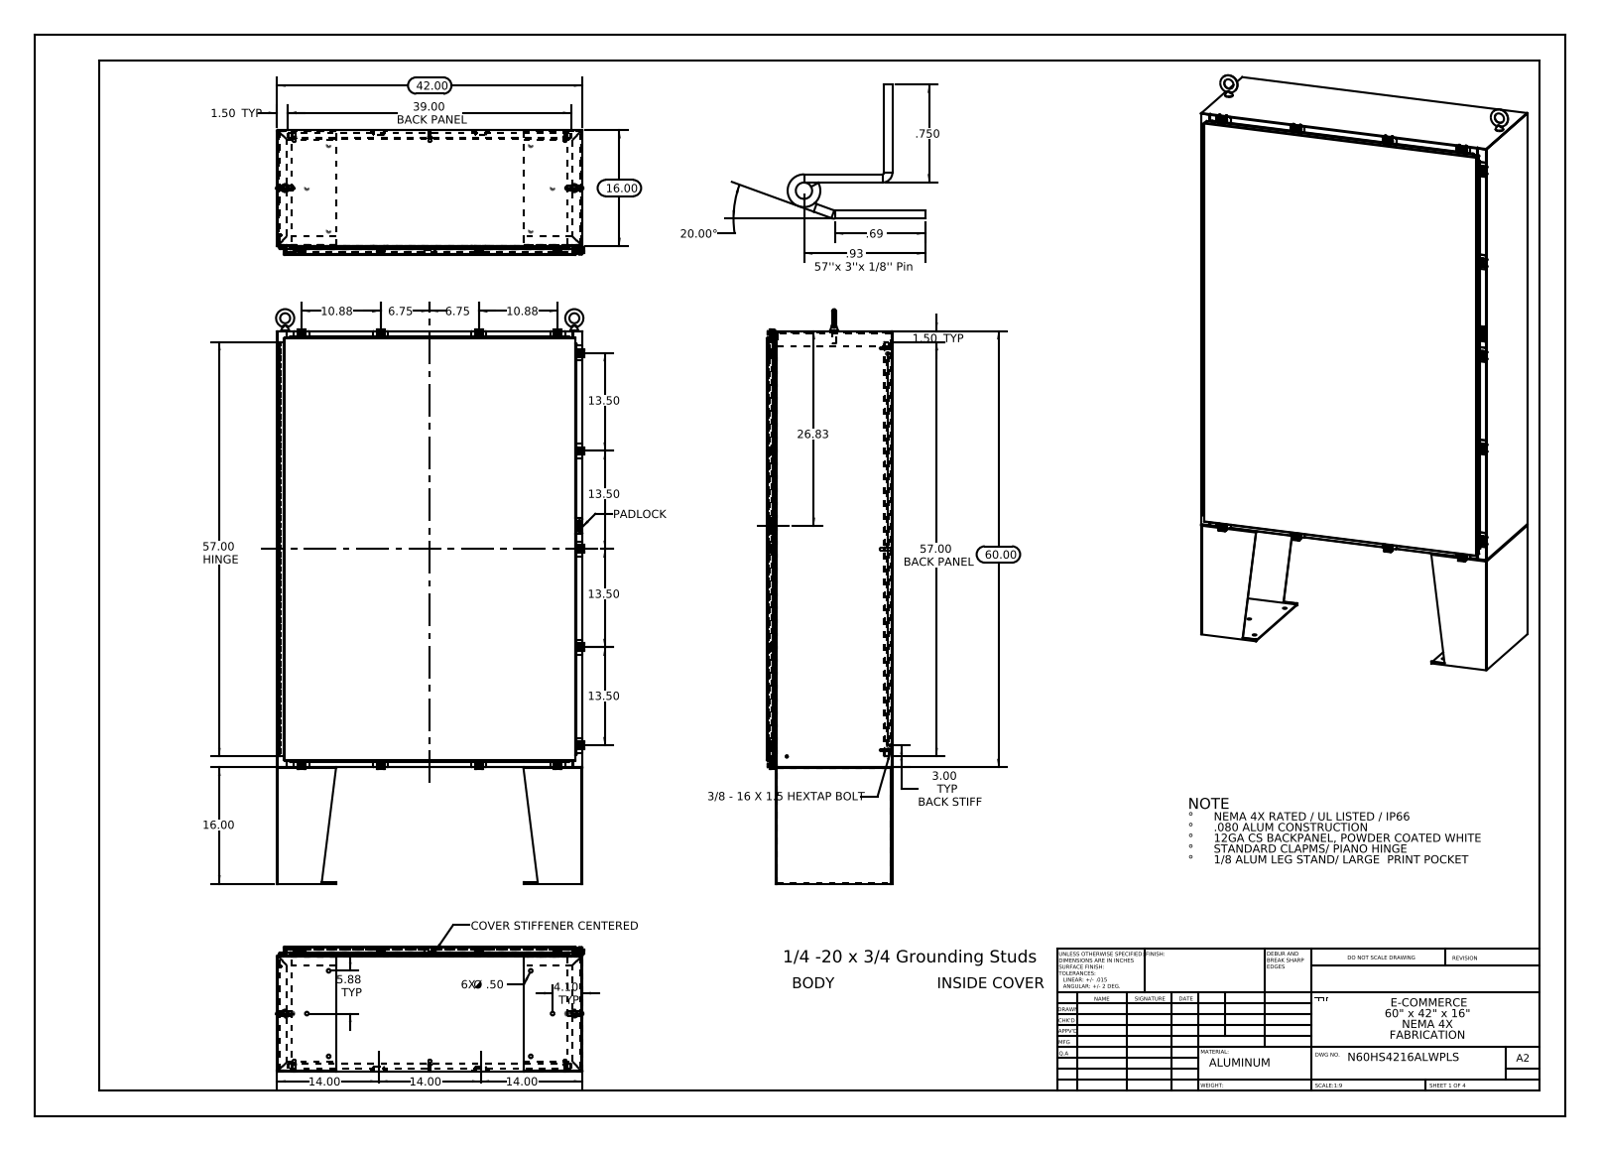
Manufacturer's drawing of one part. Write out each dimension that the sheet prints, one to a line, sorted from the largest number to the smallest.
60.00
57.00 HINGE
57.00 BACK PANEL
42.00
39.00 BACK PANEL
26.83
20.00°
16.00
16.00
14.00
14.00
14.00
13.50
13.50
13.50
13.50
10.88
10.88
6.75
6.75
5.88 TYP
4.10 TYP
3.00 TYP BACK STIFF
1.50 TYP
1.50 TYP
.93
.750
.69
6X Ø .50
